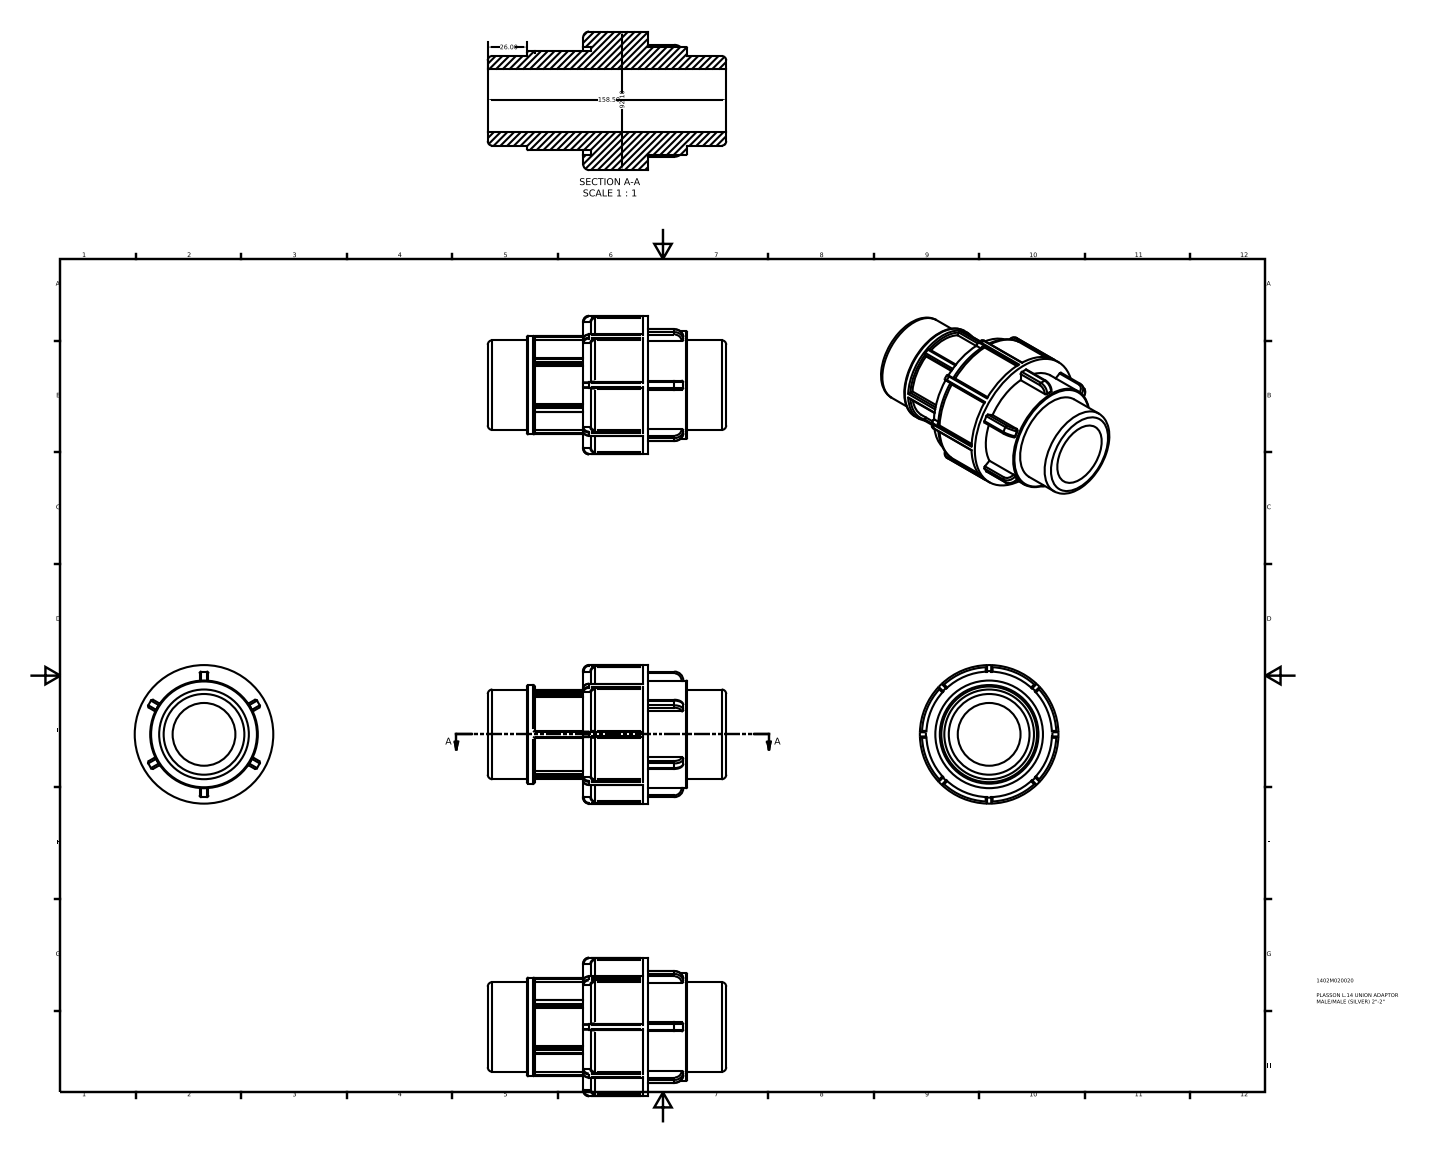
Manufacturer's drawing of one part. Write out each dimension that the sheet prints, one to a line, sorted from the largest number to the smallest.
158.50
92.10
26.00
